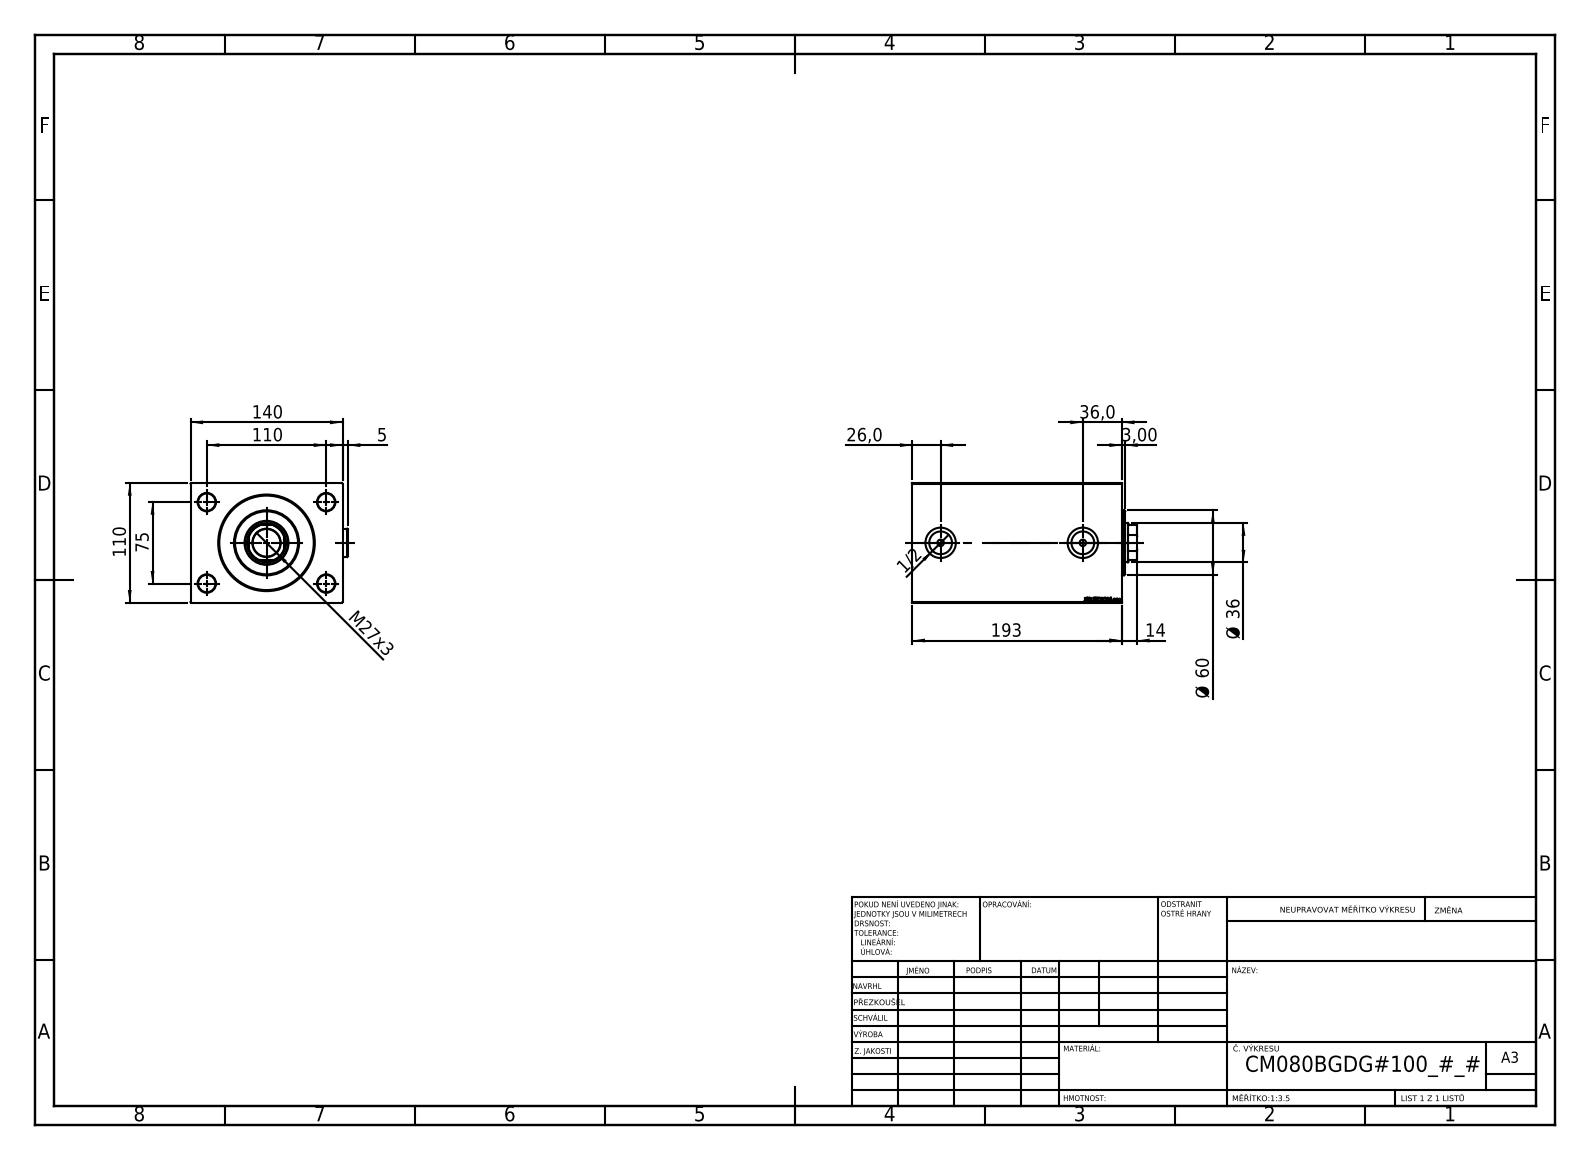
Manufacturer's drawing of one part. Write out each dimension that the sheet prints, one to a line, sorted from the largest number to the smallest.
193
140
110
110
75
Ø 60
36,0
Ø 36
M27x3
26,0
14
5
3,00
1/2
